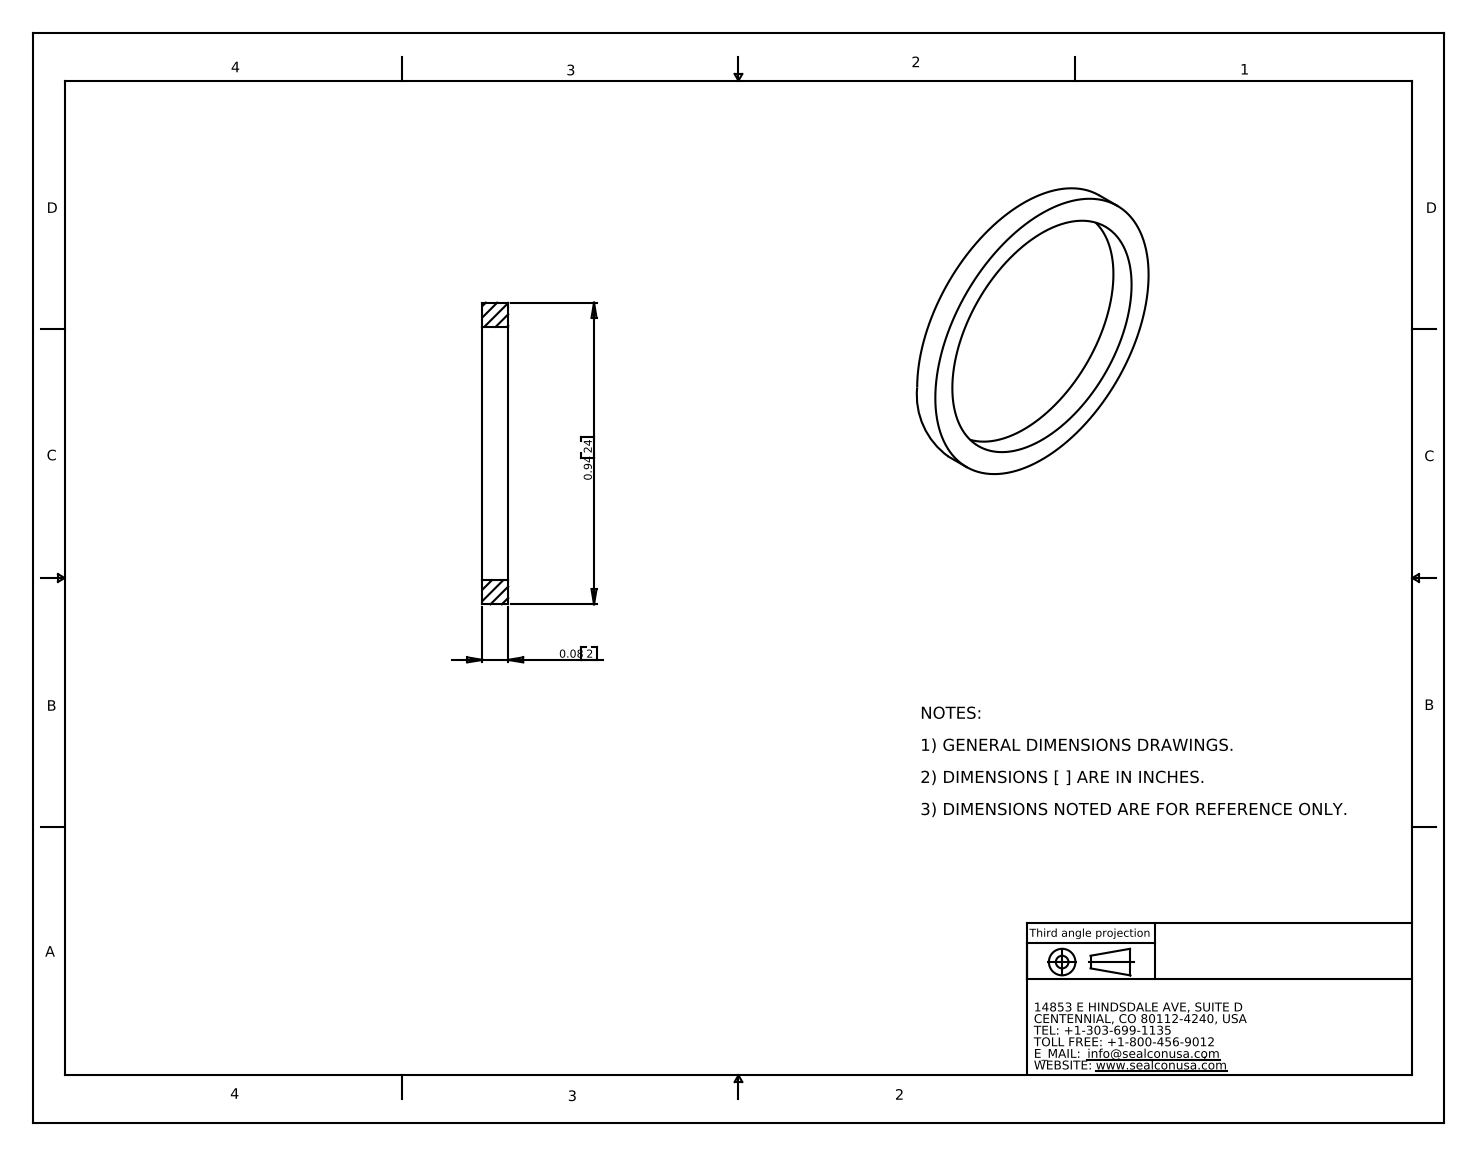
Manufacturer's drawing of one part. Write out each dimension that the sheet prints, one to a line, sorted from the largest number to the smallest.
0.94 24
0.08 2
